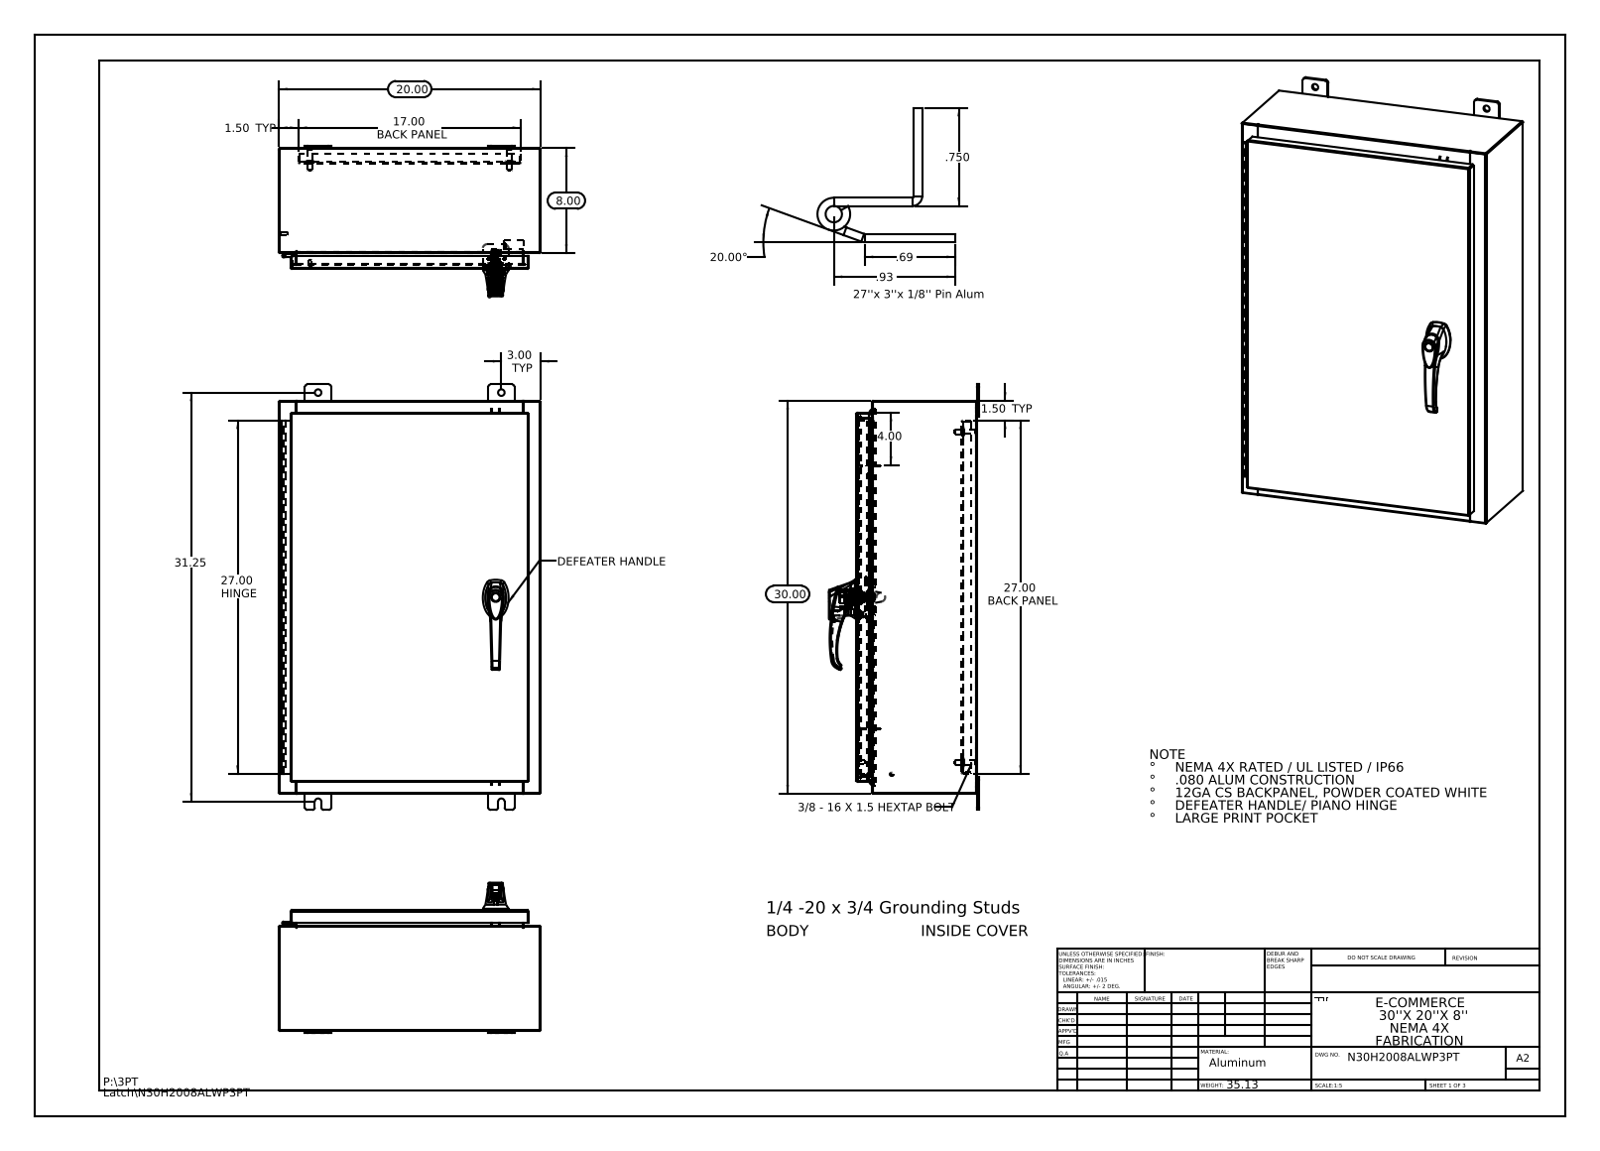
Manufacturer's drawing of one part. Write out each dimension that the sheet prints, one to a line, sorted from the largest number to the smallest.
31.25
30.00
27.00 HINGE
27.00 BACK PANEL
20.00
20.00°
17.00 BACK PANEL
8.00
4.00
3.00 TYP
1.50 TYP
1.50 TYP
.93
.750
.69
